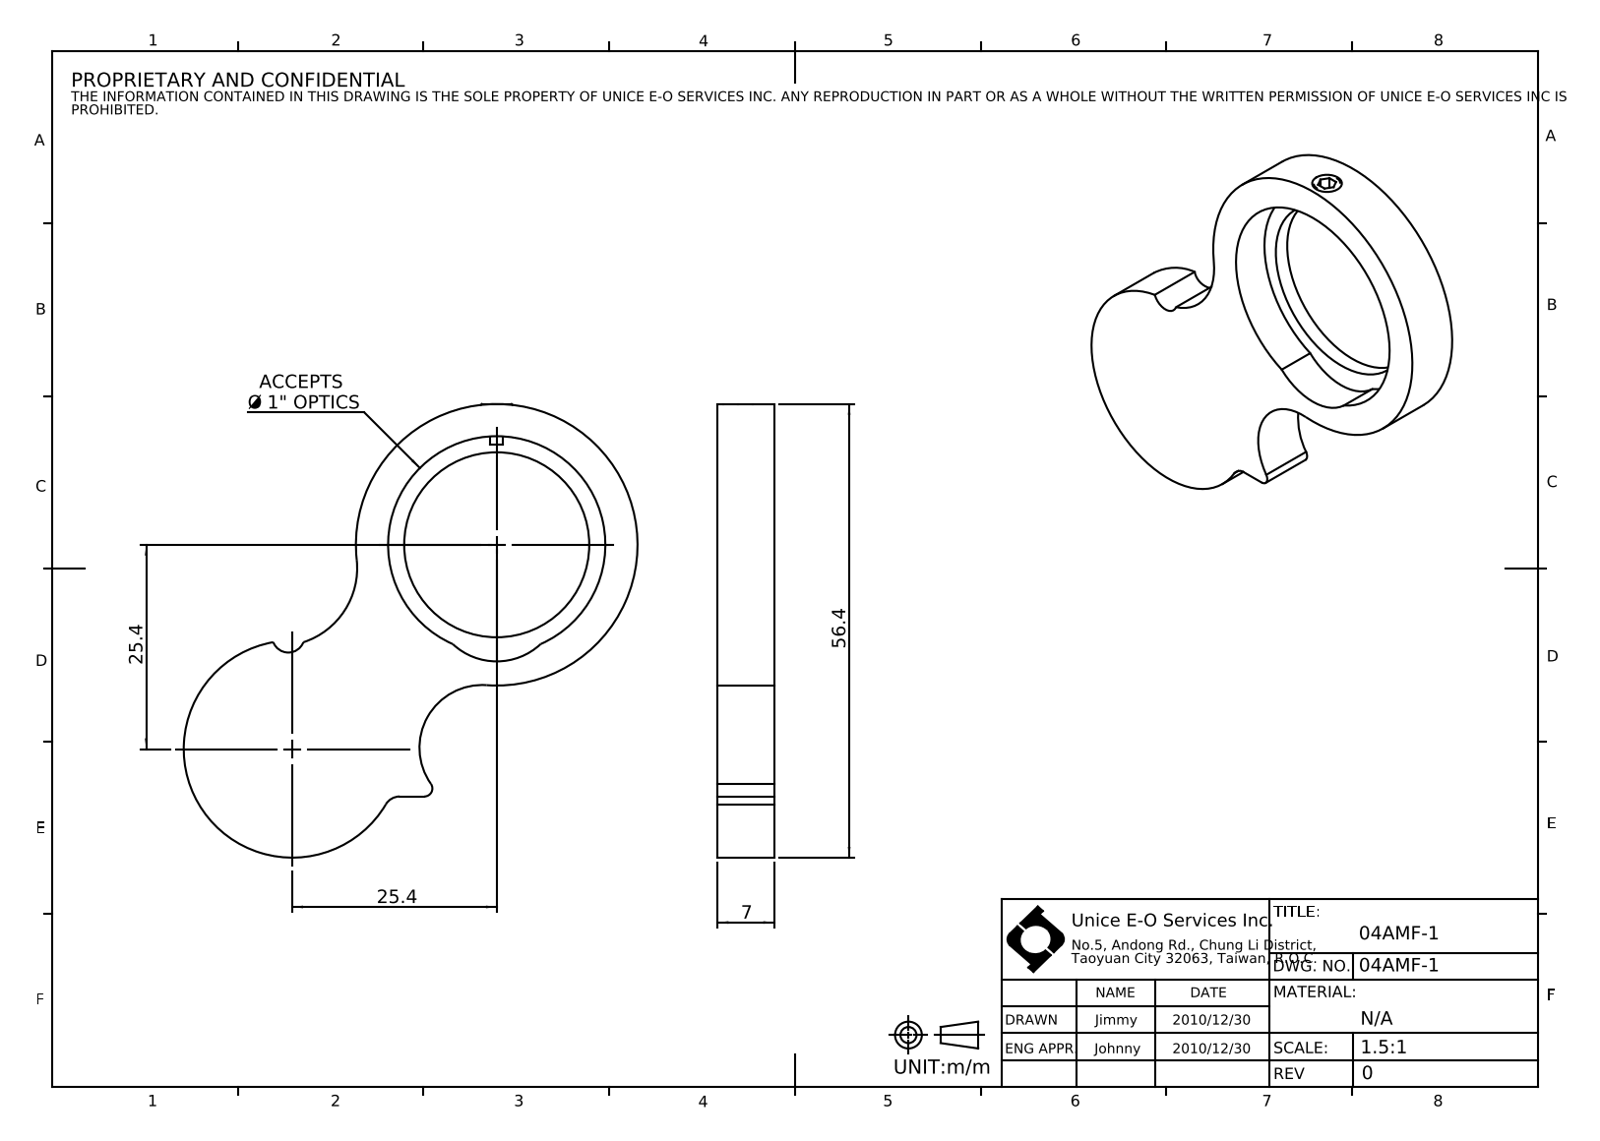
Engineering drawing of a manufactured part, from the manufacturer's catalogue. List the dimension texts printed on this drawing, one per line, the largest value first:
56.4
25.4
25.4
7
ACCEPTS Ø 1" OPTICS
